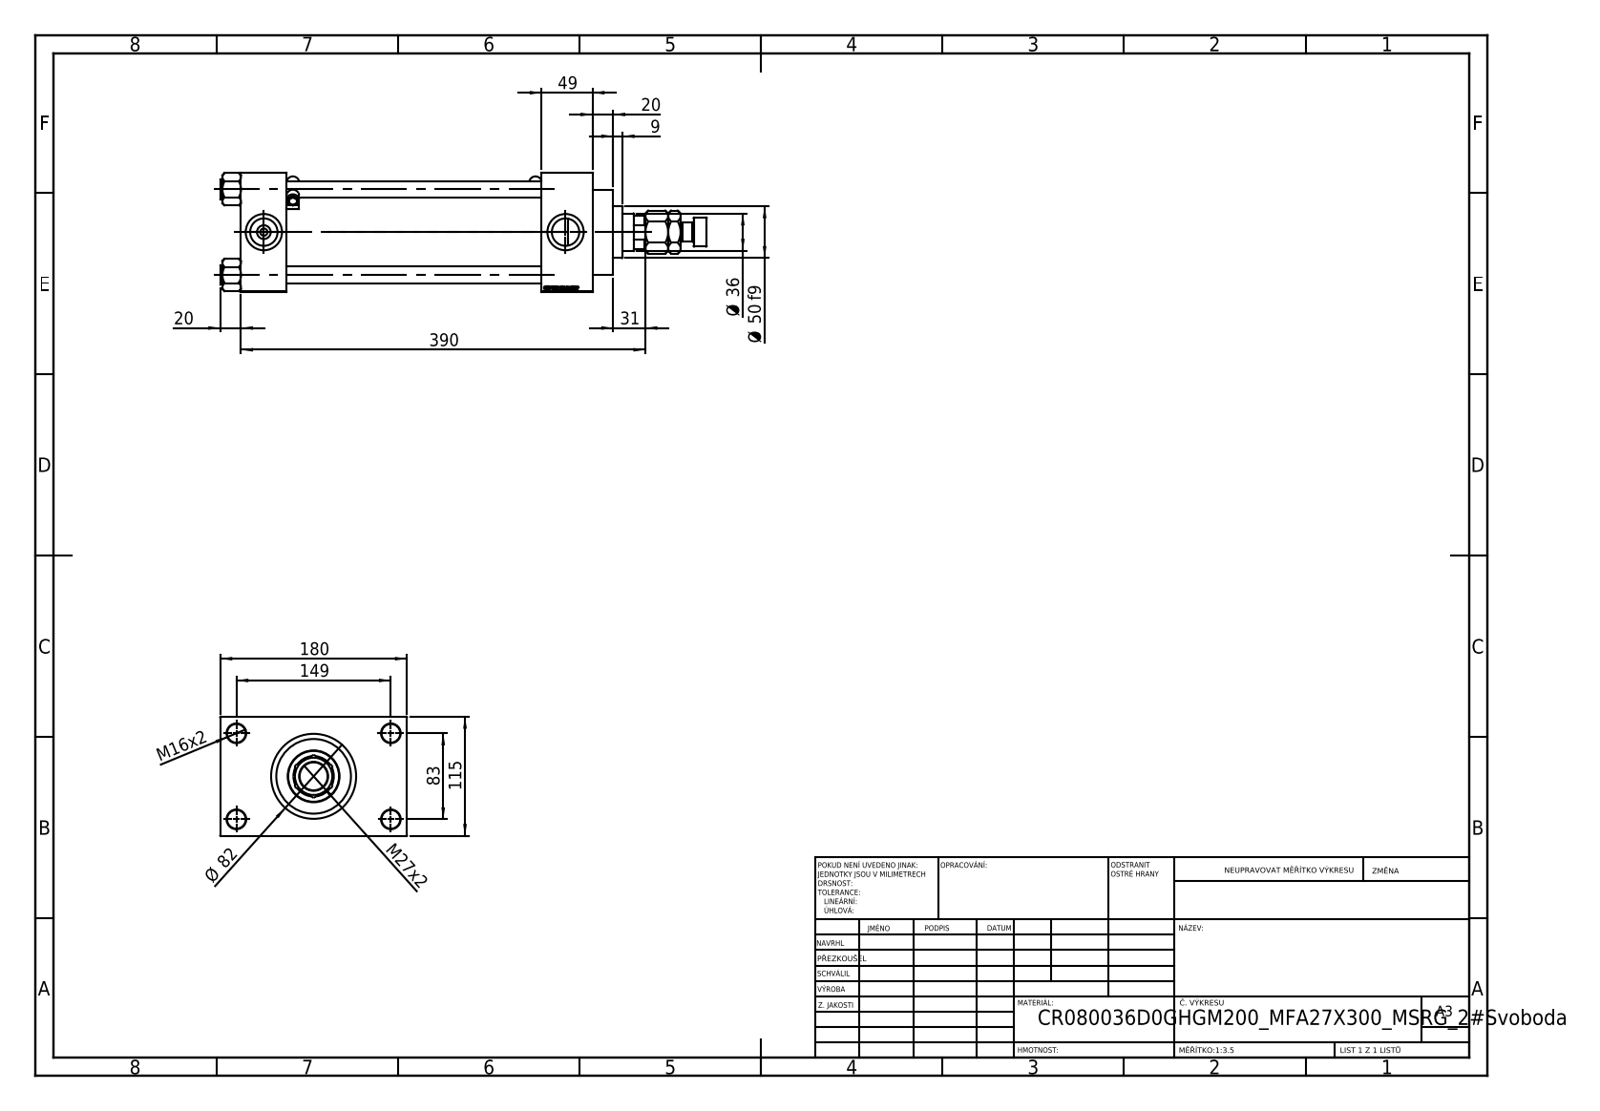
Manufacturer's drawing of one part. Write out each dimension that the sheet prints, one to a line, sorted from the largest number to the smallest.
390
180
149
115
83
Ø 82
Ø 50 f9
49
Ø 36
31
M27x2
20
20
M16x2
9
